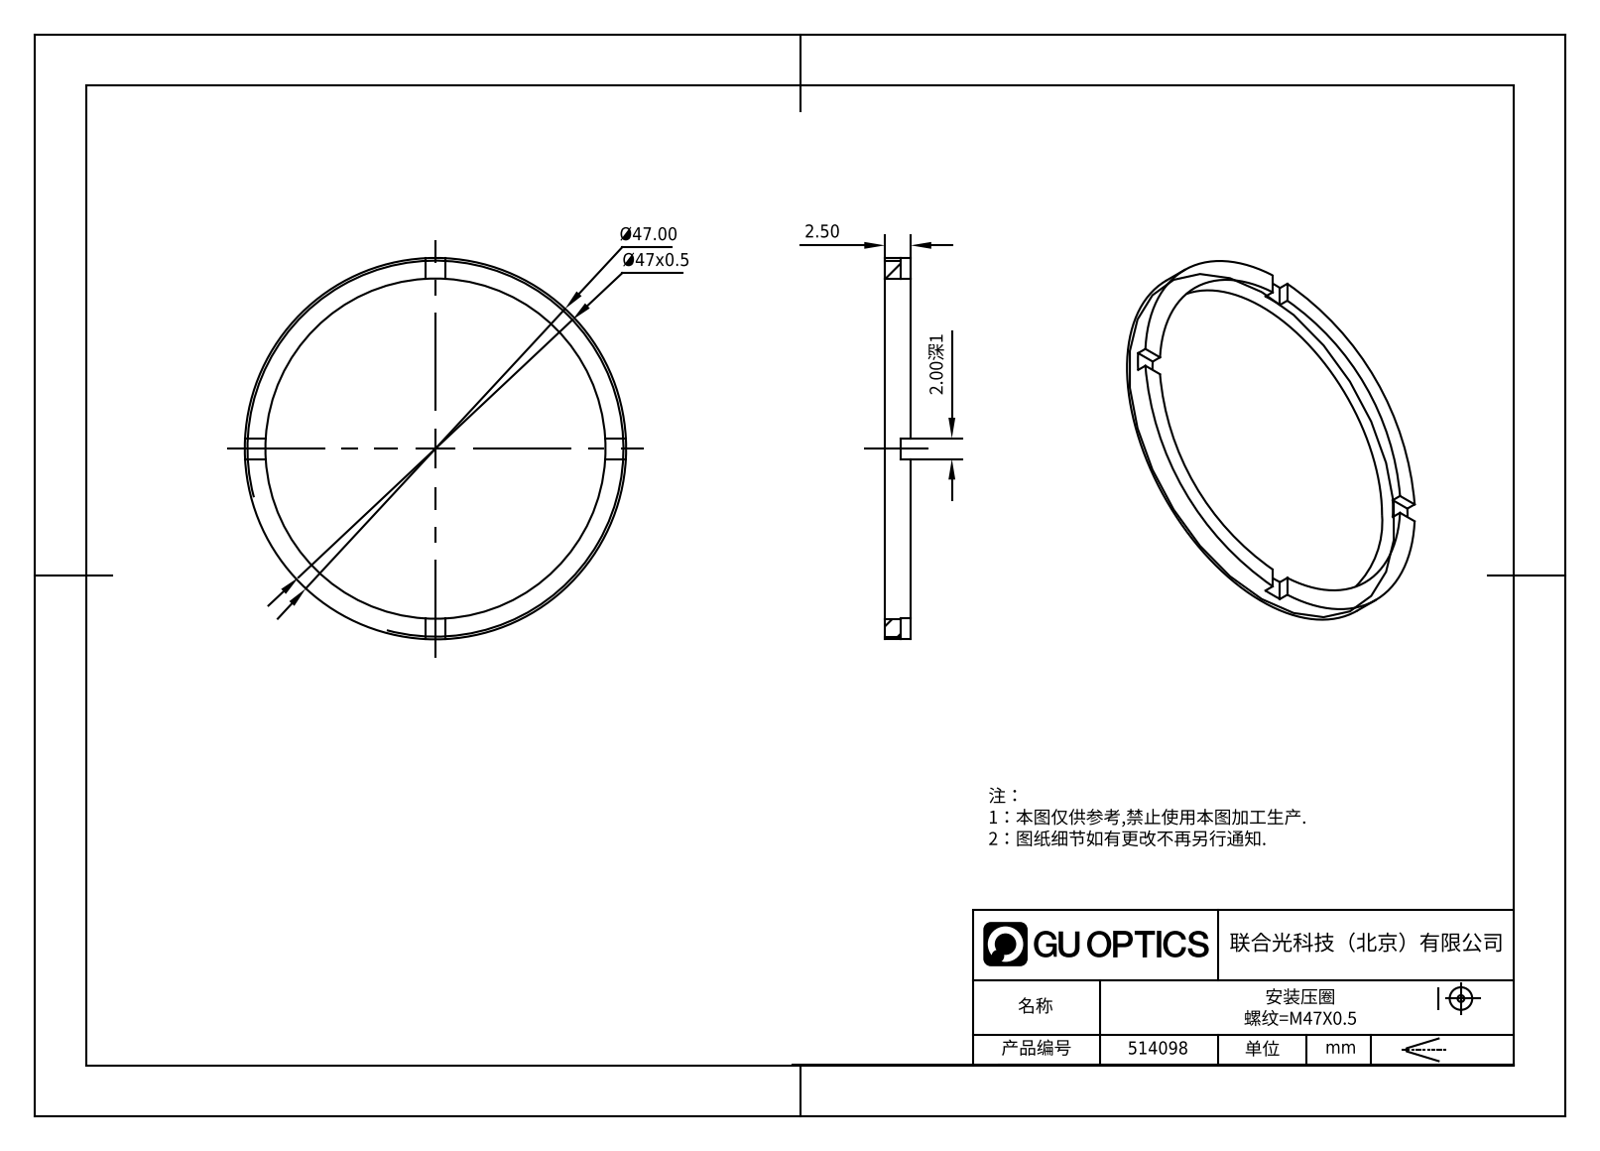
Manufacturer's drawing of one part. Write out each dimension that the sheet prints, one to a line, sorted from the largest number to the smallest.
Ø47.00
Ø47x0.5
2.50
2.00深1
